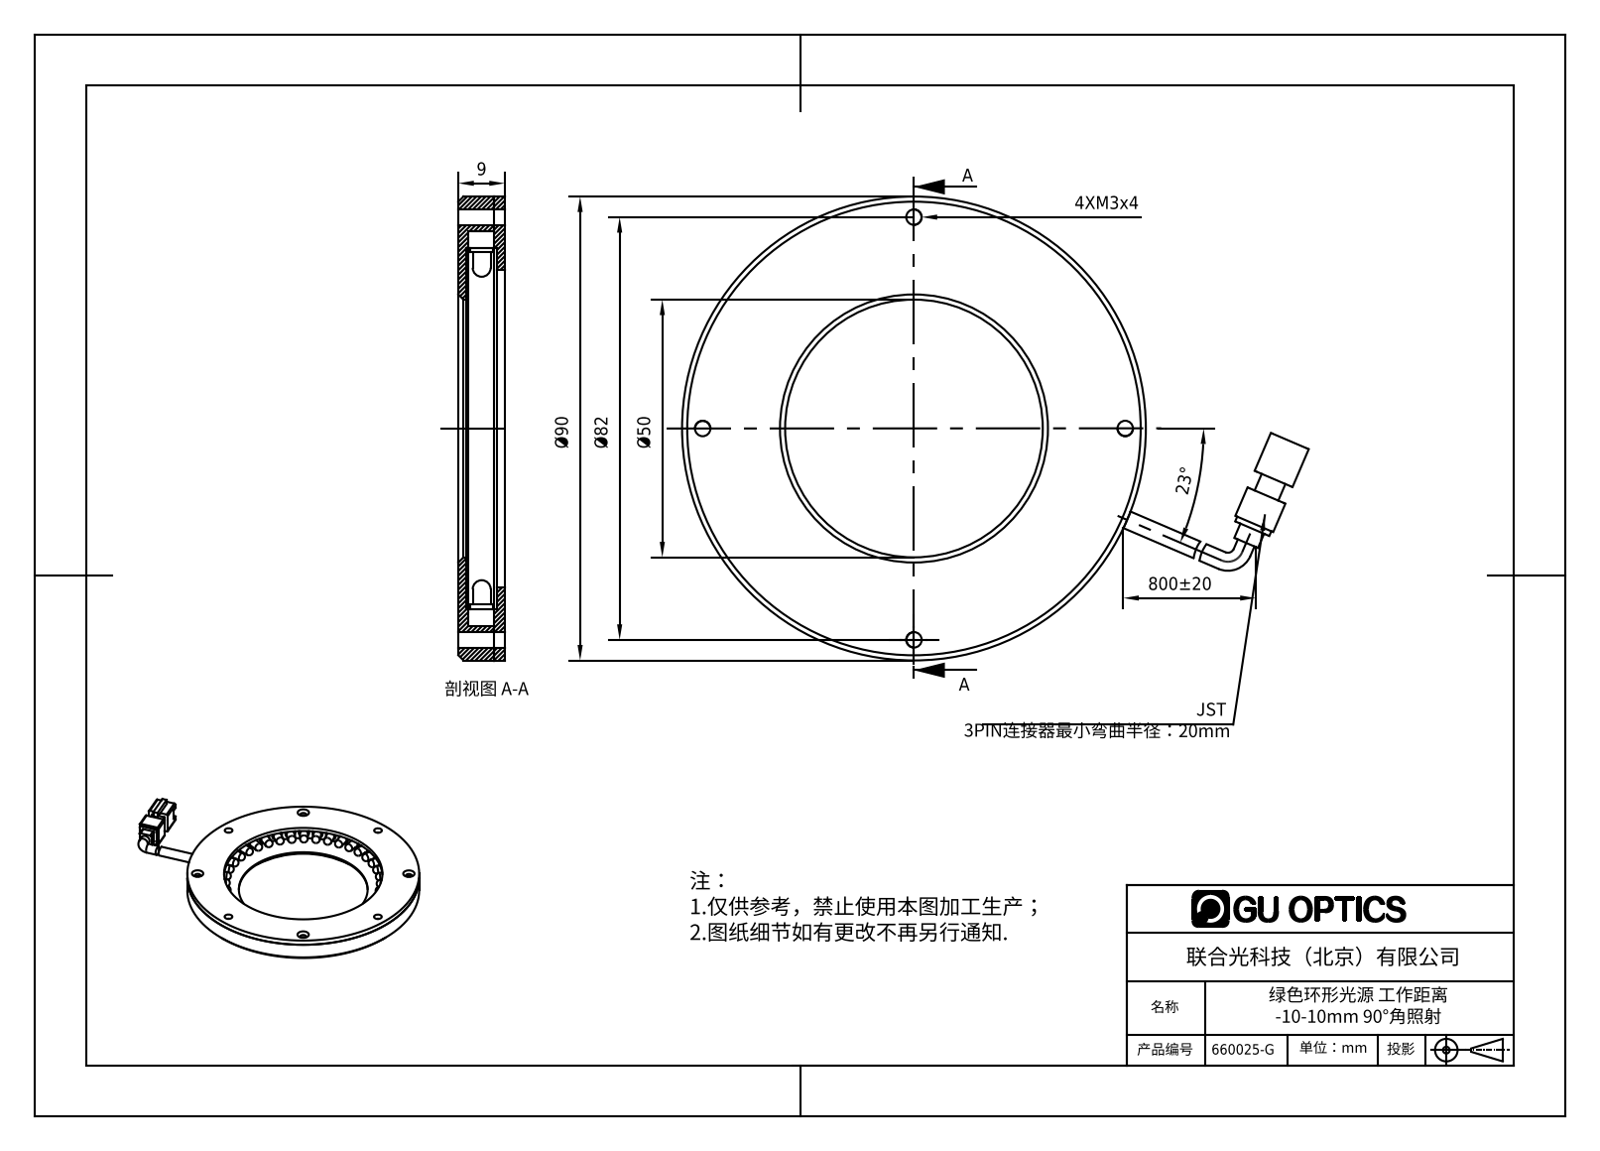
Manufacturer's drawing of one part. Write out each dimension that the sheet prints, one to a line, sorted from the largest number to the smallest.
800±20
Ø90
Ø82
Ø50
23°
9
4XM3x4
